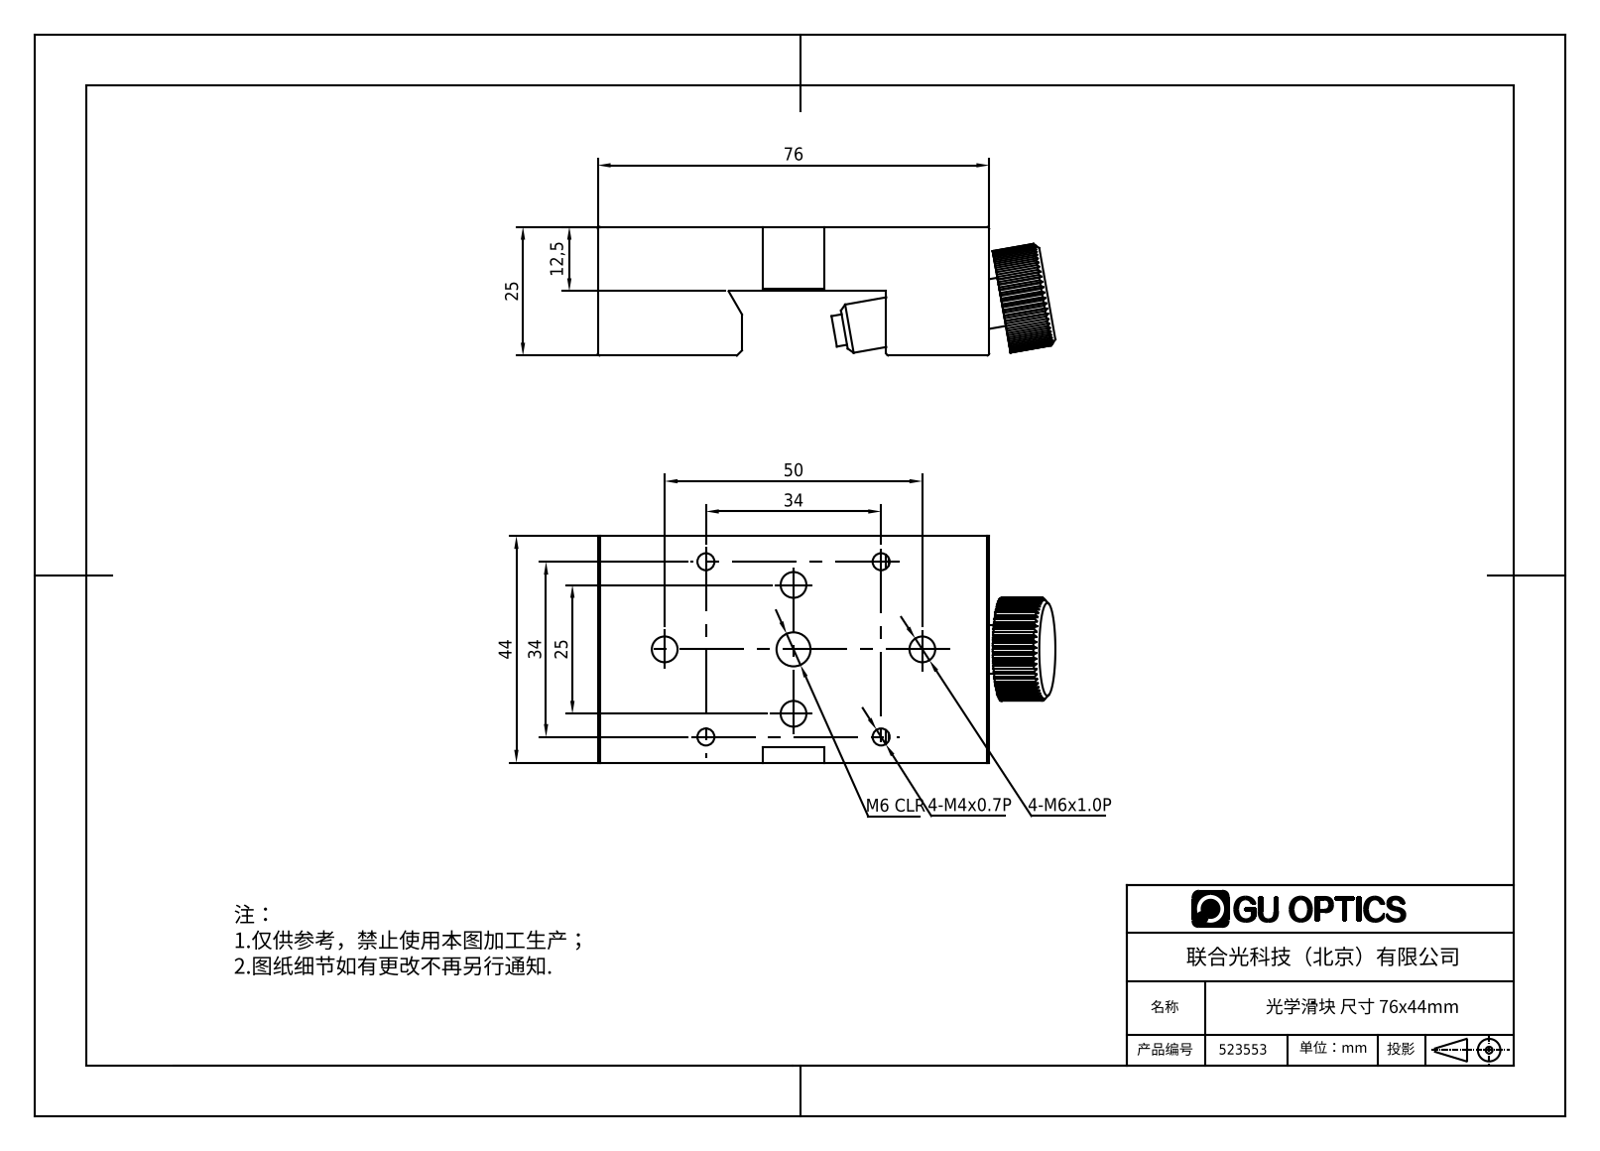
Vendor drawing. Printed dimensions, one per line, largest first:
76
50
44
34
34
25
25
12,5
4-M6x1.0P
M6 CLR
4-M4x0.7P
